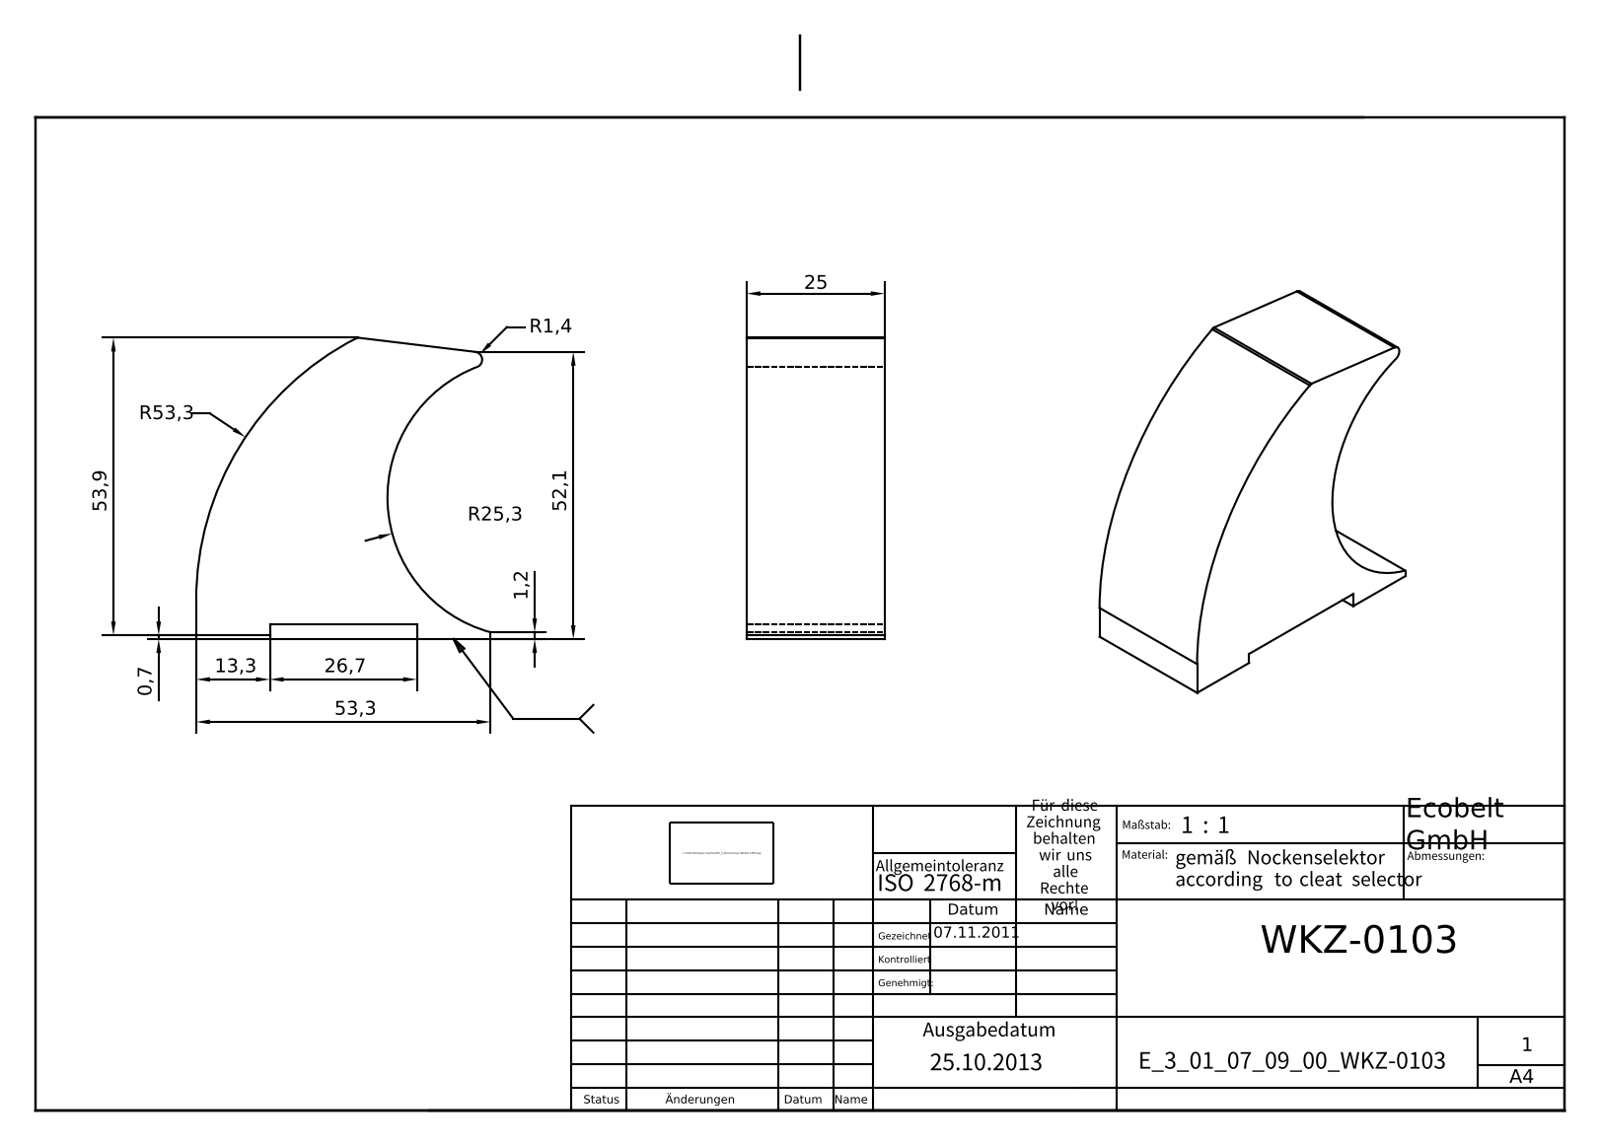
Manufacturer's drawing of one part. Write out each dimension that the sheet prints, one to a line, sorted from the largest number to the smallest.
53,9
53,3
R53,3
52,1
26,7
R25,3
25
13,3
R1,4
1,2
0,7
